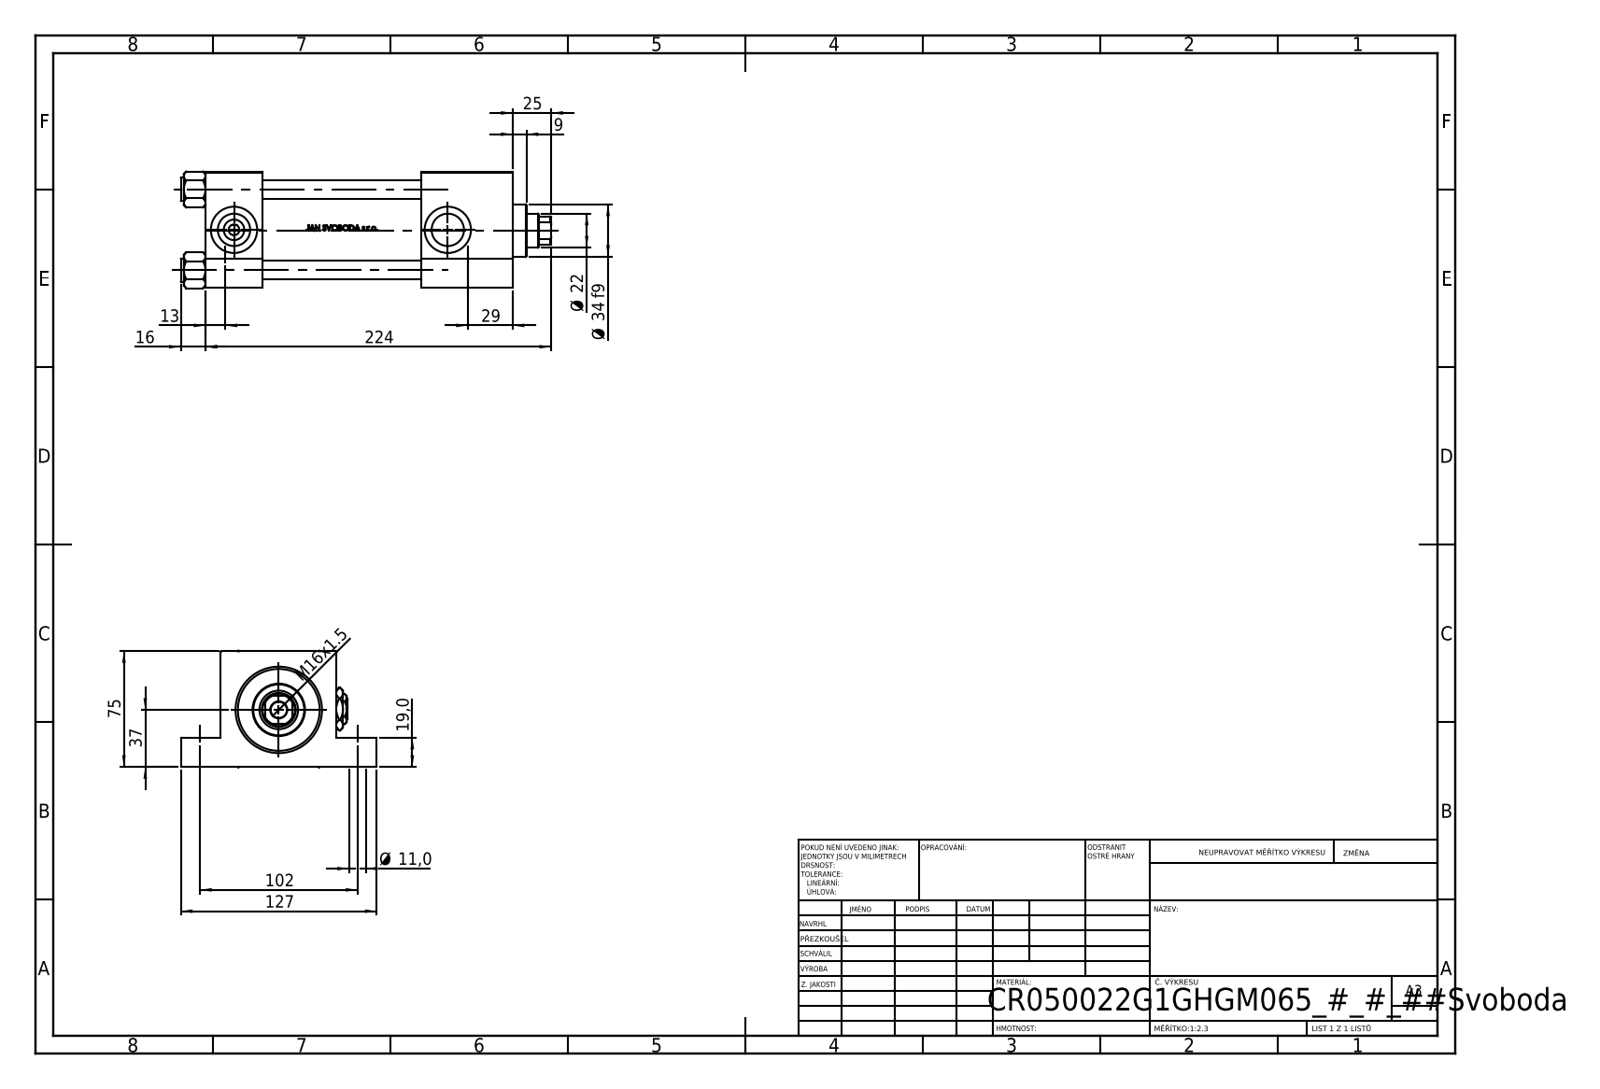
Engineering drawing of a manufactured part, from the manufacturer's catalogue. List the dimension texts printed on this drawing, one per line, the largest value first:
224
127
102
75
37
Ø 34 f9
29
25
Ø 22
19,0
16
M16x1.5
13
Ø 11,0
9
